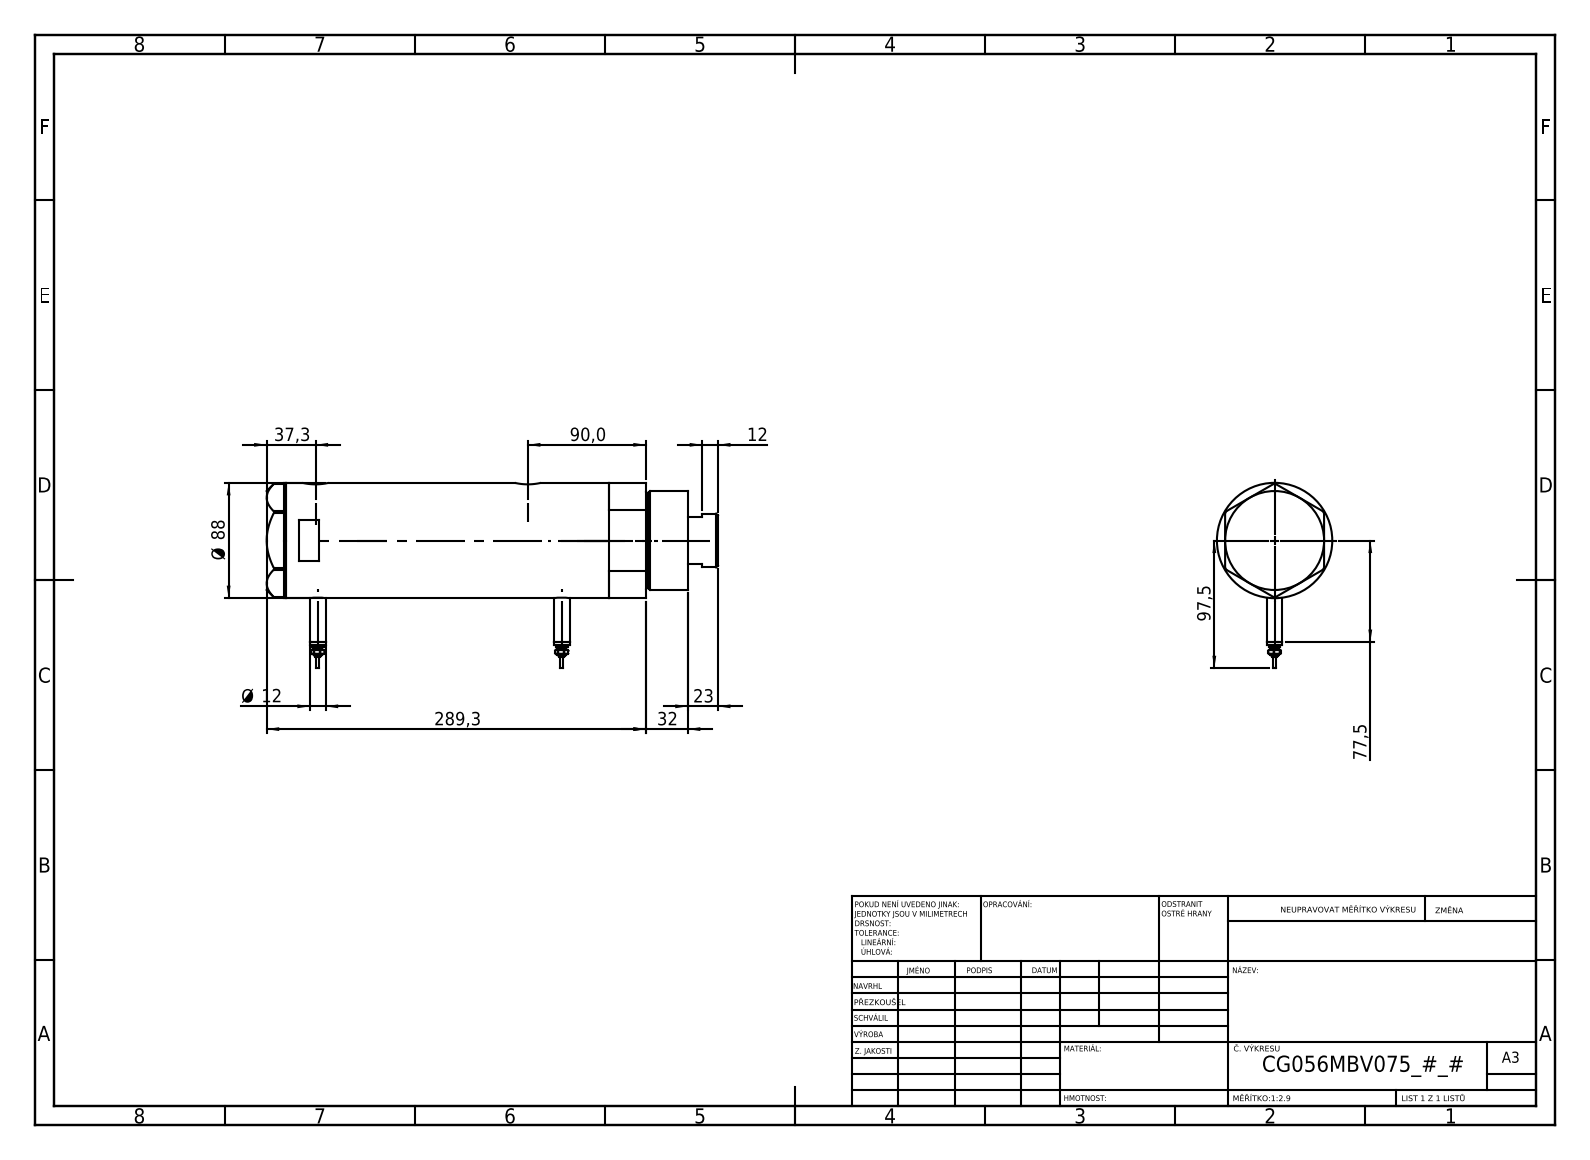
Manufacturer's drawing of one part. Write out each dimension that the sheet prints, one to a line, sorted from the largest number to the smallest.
289,3
97,5
90,0
Ø 88
77,5
37,3
32
23
12
Ø 12
